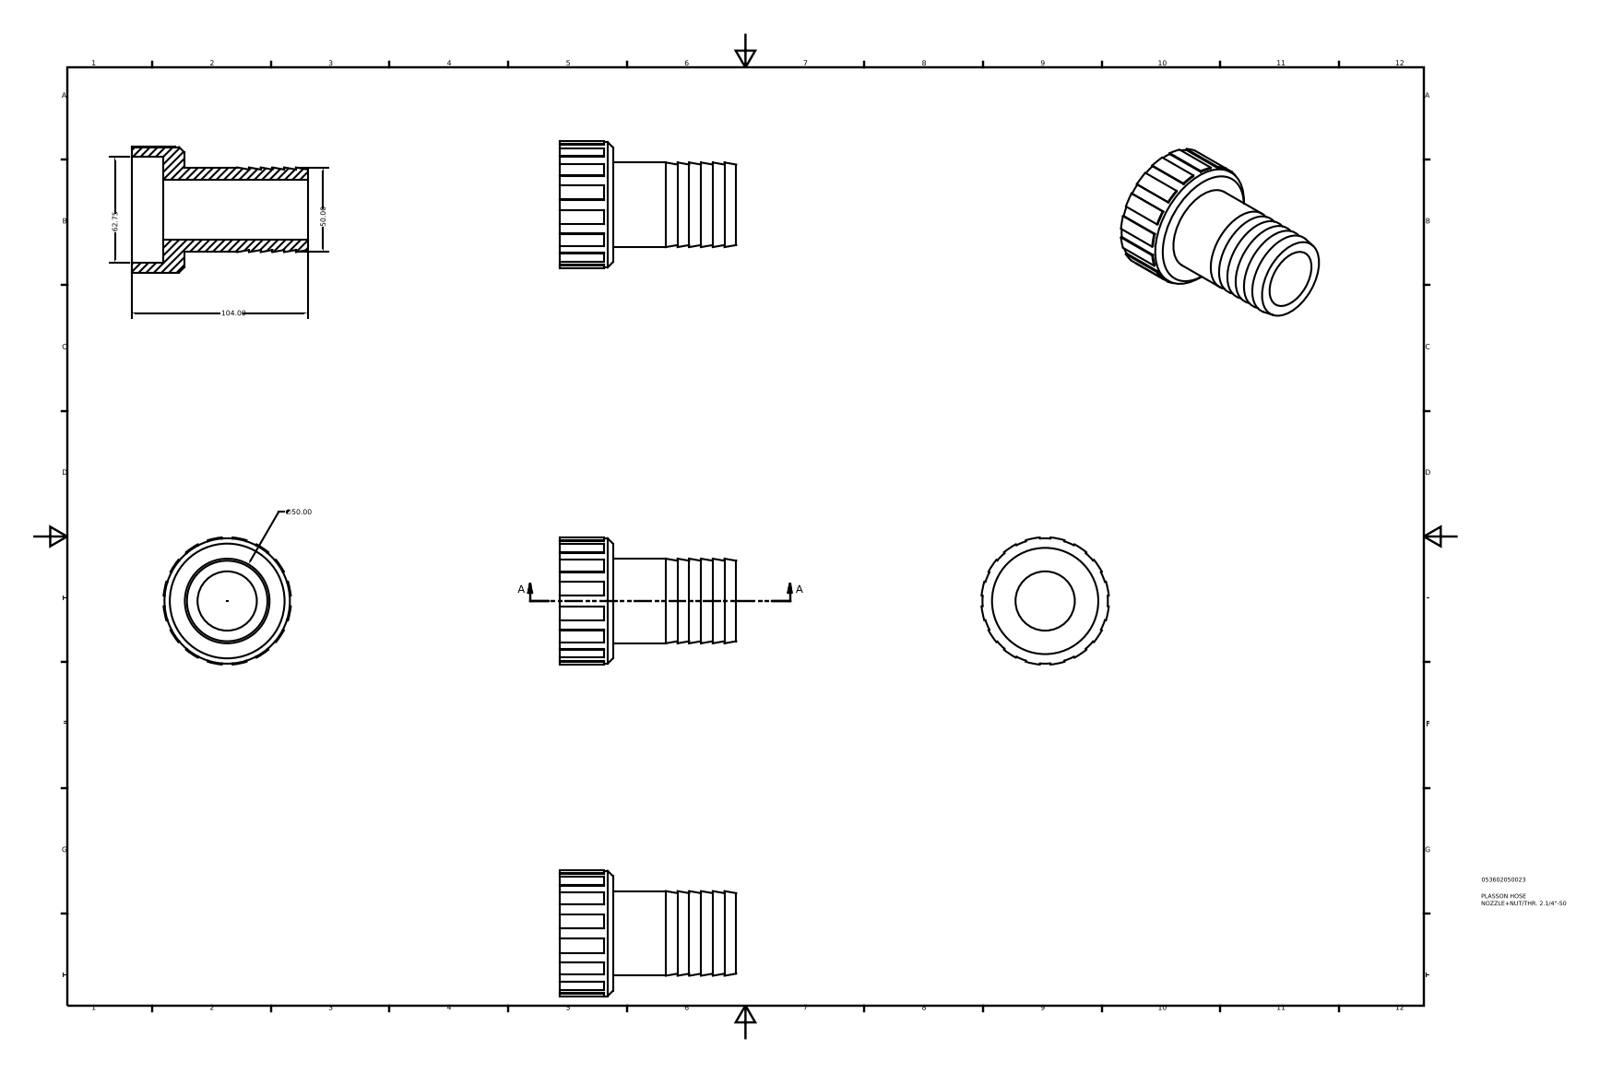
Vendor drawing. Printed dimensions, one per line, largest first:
104.00
62.75
50.00
∅50.00
